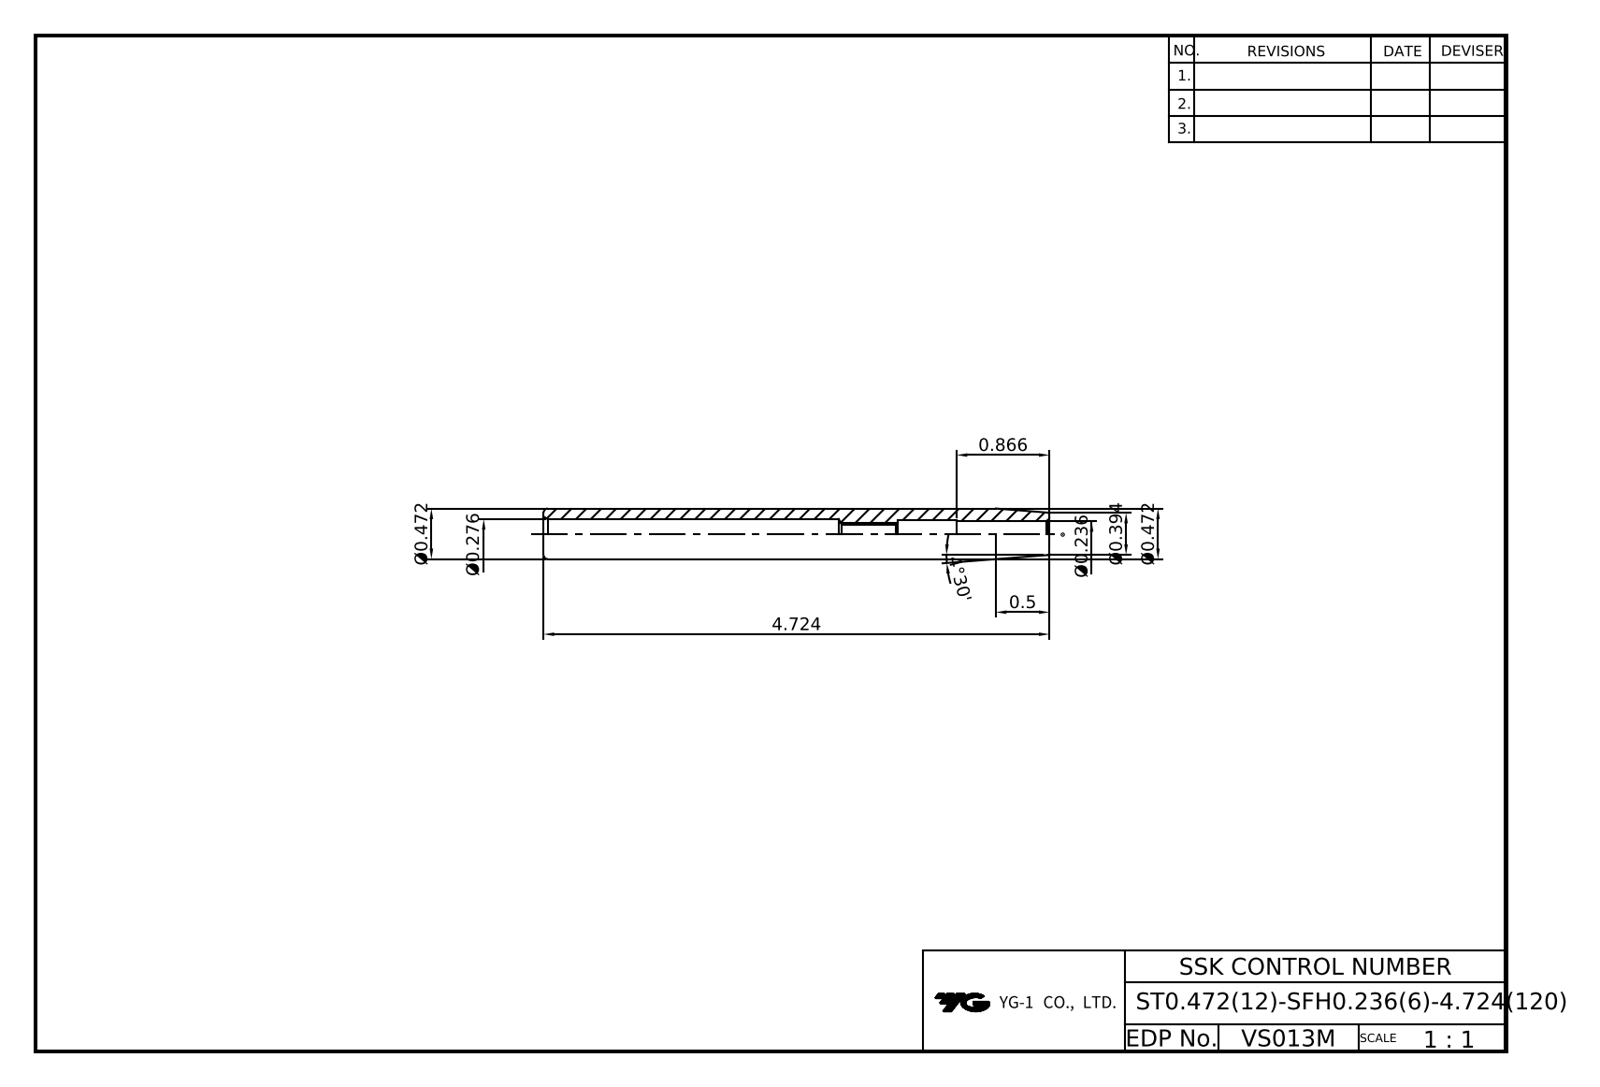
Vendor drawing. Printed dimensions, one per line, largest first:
4.724
4°30'
0.866
0.5
Ø0.472
Ø0.472
Ø0.394
